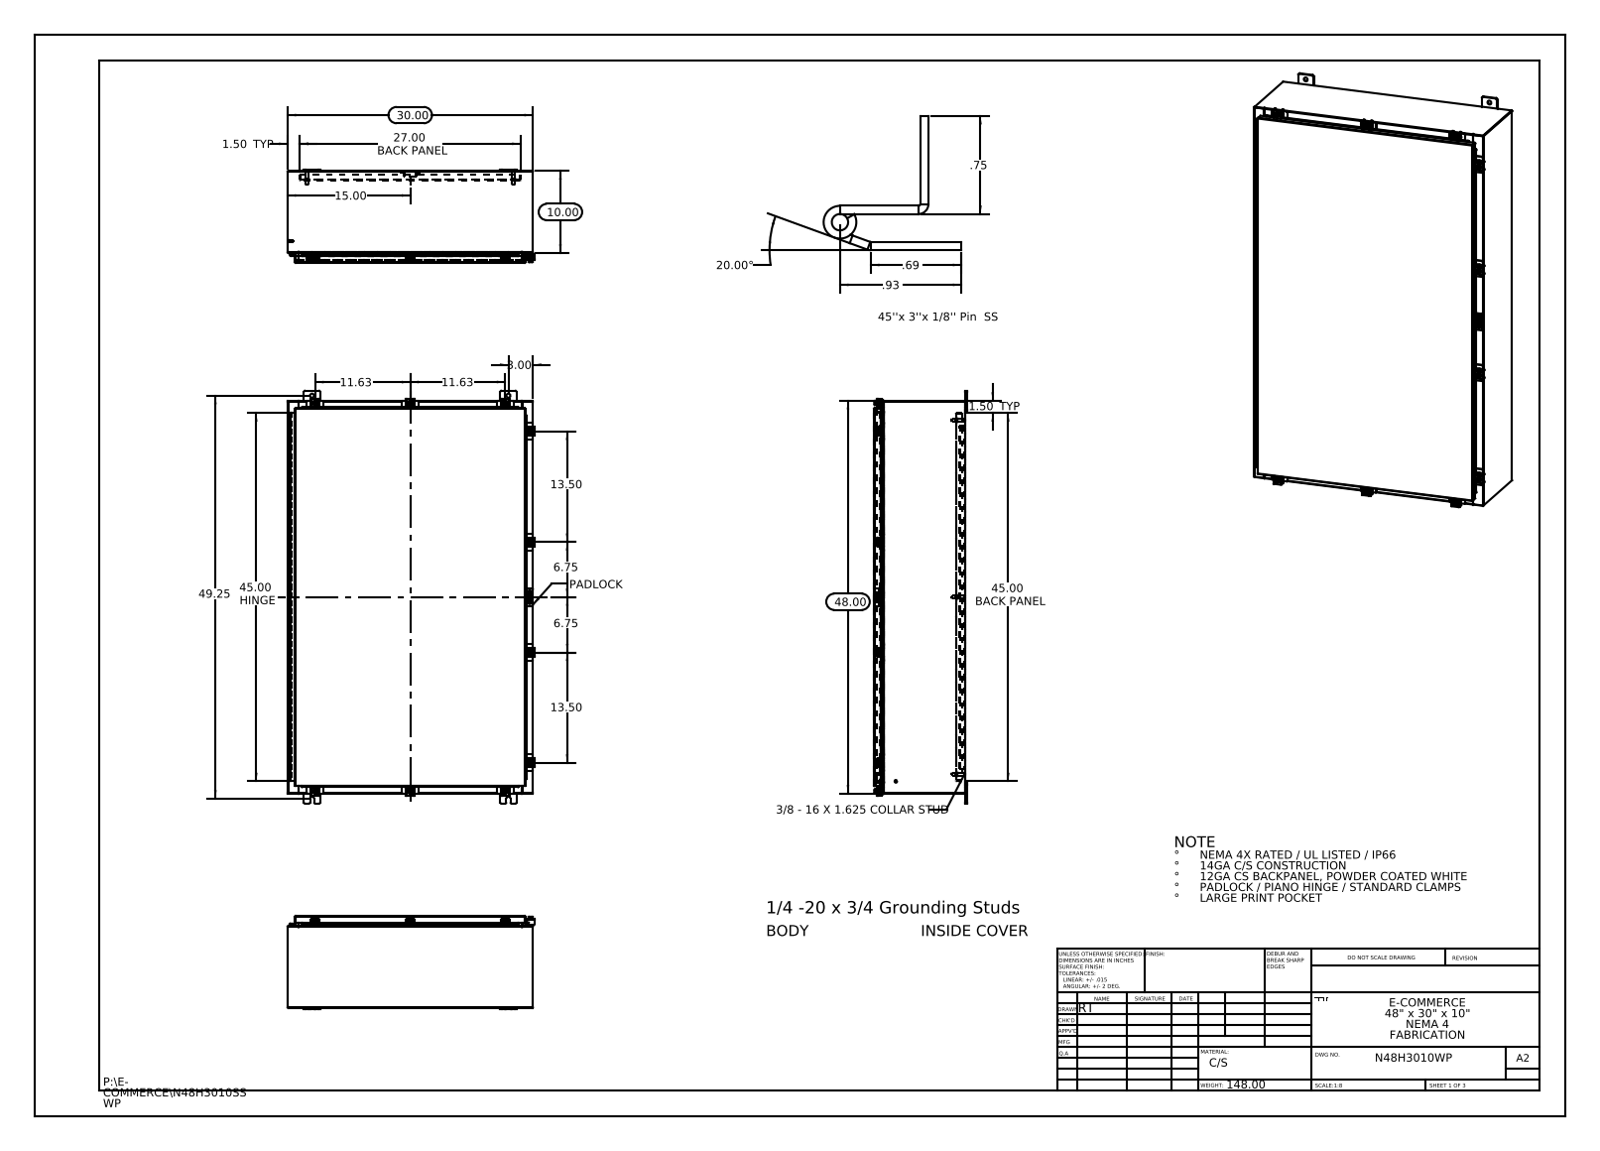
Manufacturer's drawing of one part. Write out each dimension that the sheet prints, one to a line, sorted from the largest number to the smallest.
49.25
48.00
45.00 HINGE
45.00 BACK PANEL
30.00
27.00 BACK PANEL
20.00°
15.00
13.50
13.50
11.63
11.63
10.00
6.75
6.75
3.00
1.50 TYP
1.50 TYP
.93
.75
.69
